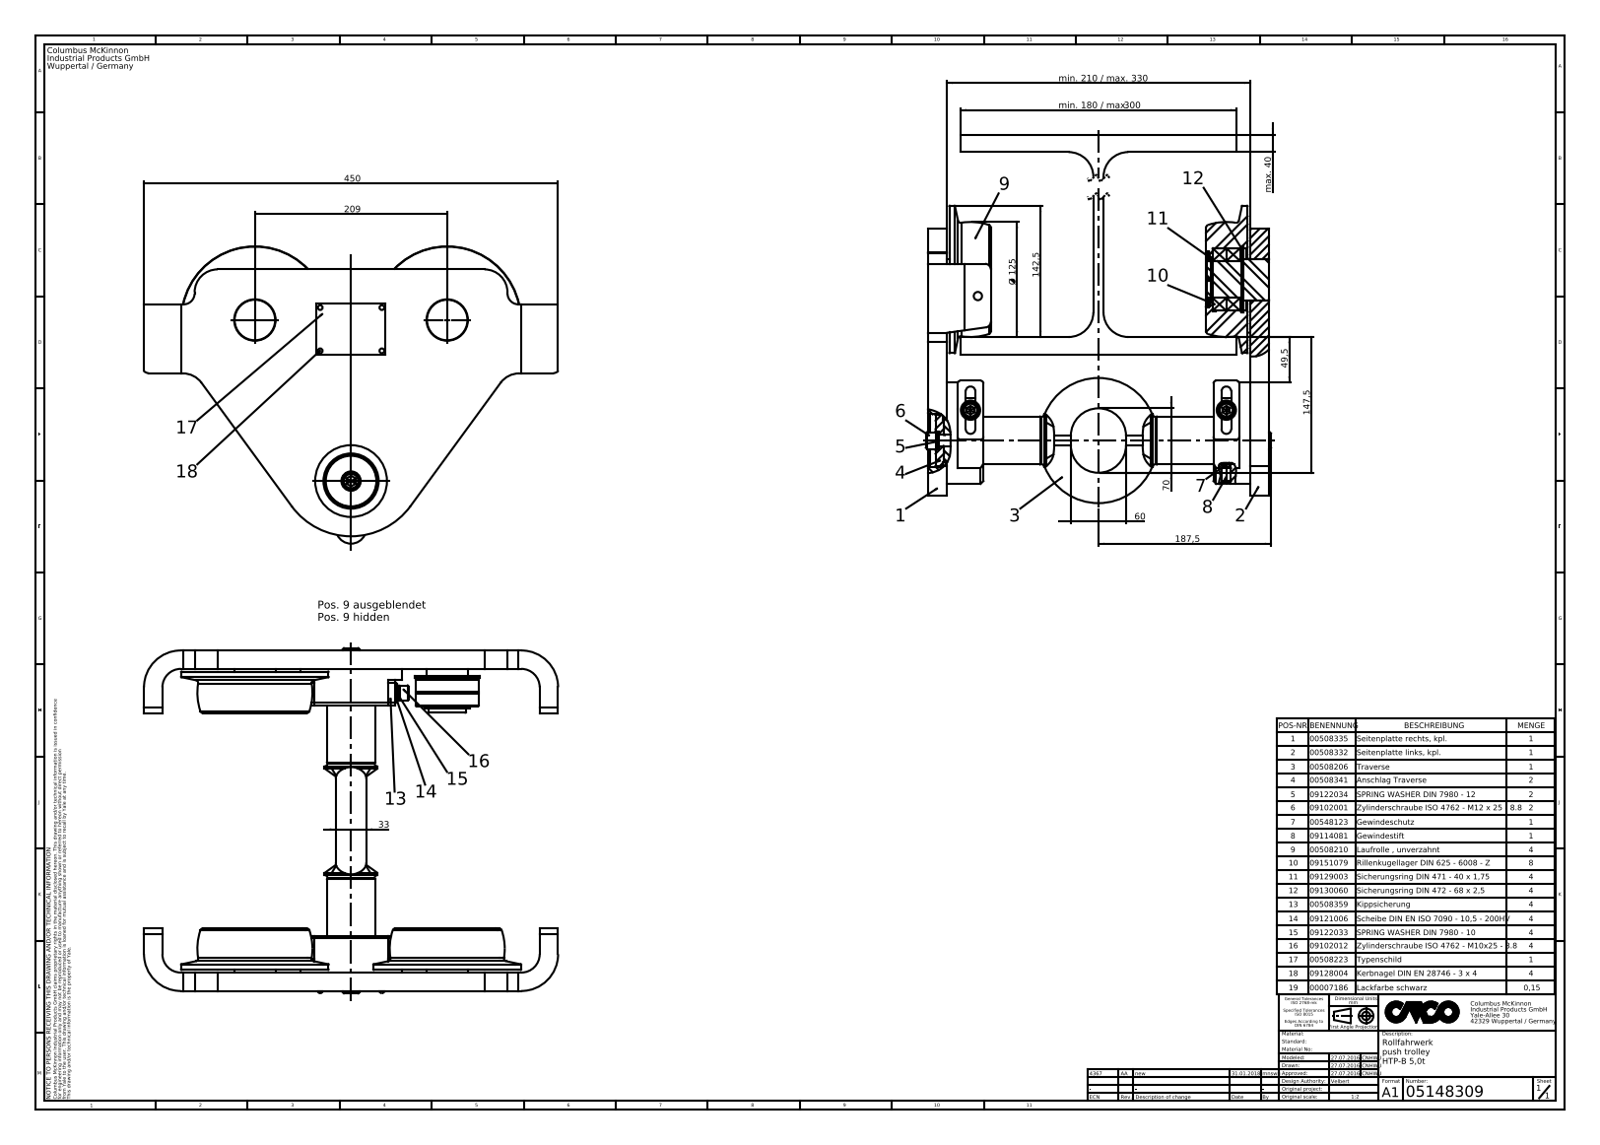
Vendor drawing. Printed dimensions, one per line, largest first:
450
min. 210 / max. 330
209
187,5
min. 180 / max. 300
147,5
142,5
Ø 125
70
60
49,5
max. 40
33
